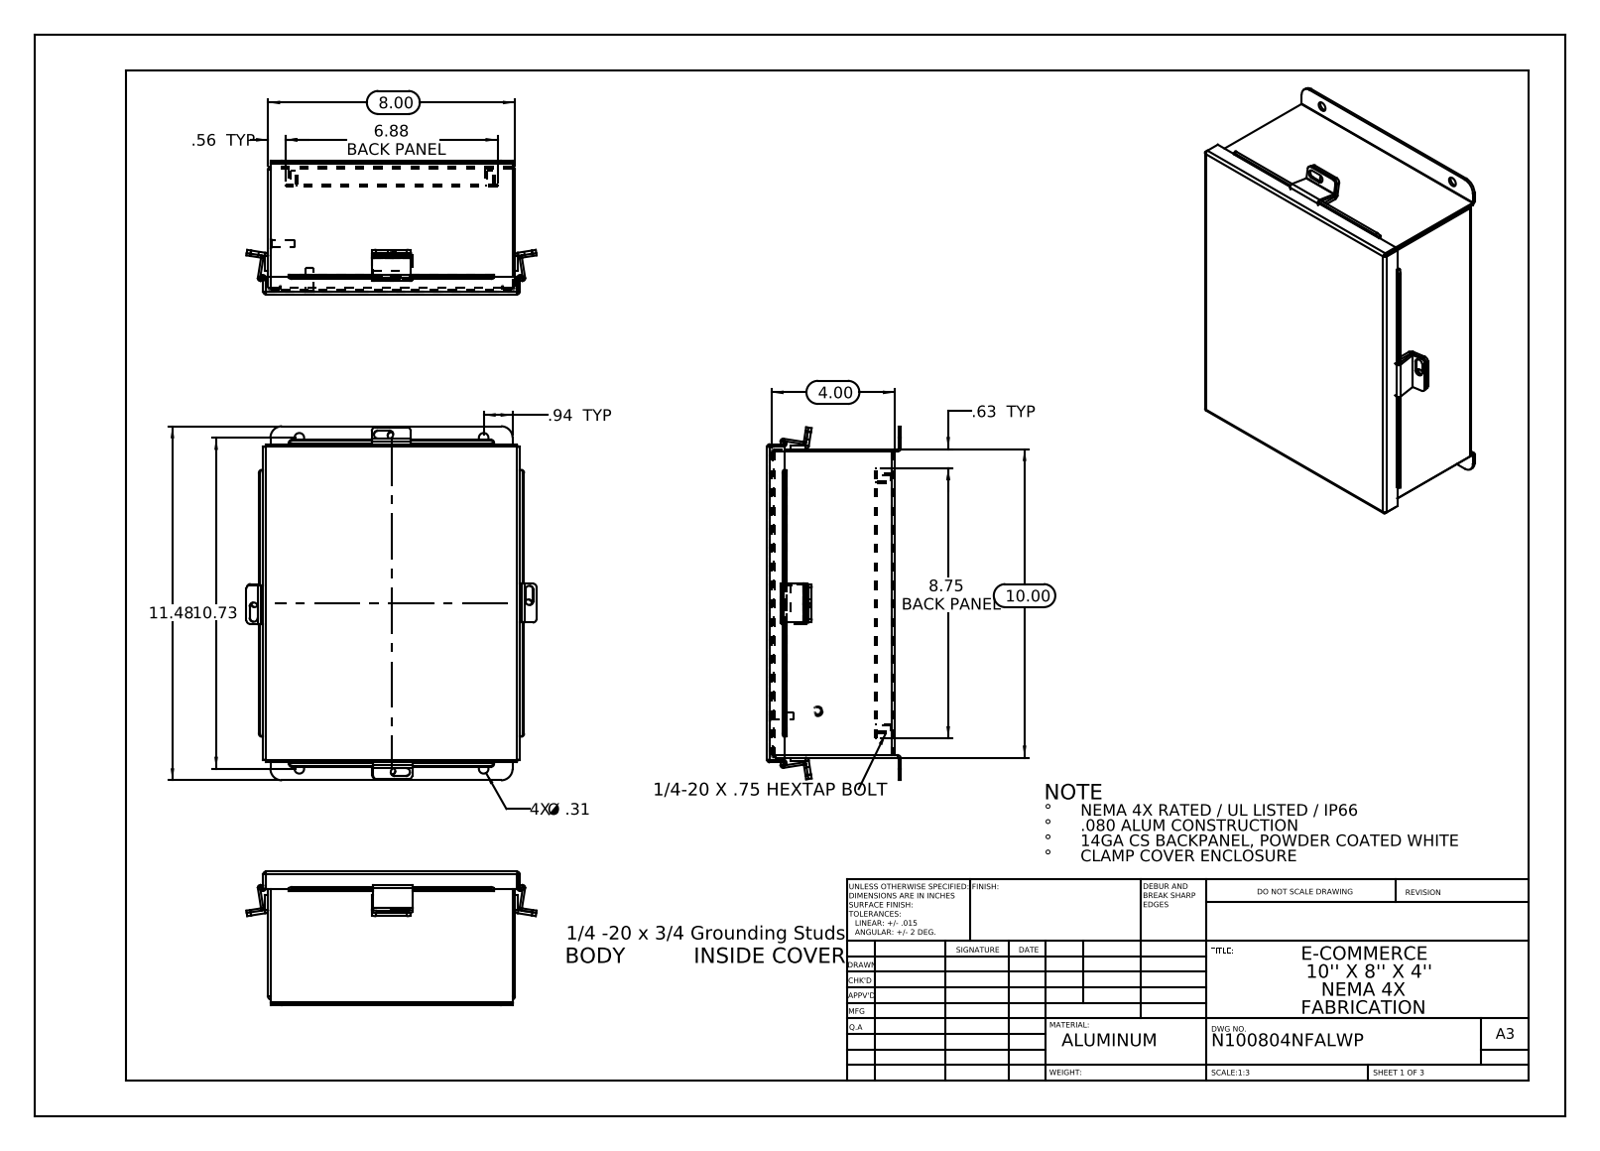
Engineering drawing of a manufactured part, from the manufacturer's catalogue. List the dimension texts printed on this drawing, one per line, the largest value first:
11.48
10.73
10.00
8.75 BACK PANEL
8.00
6.88 BACK PANEL
4.00
.94 TYP
.63 TYP
.56 TYP
4X Ø .31
